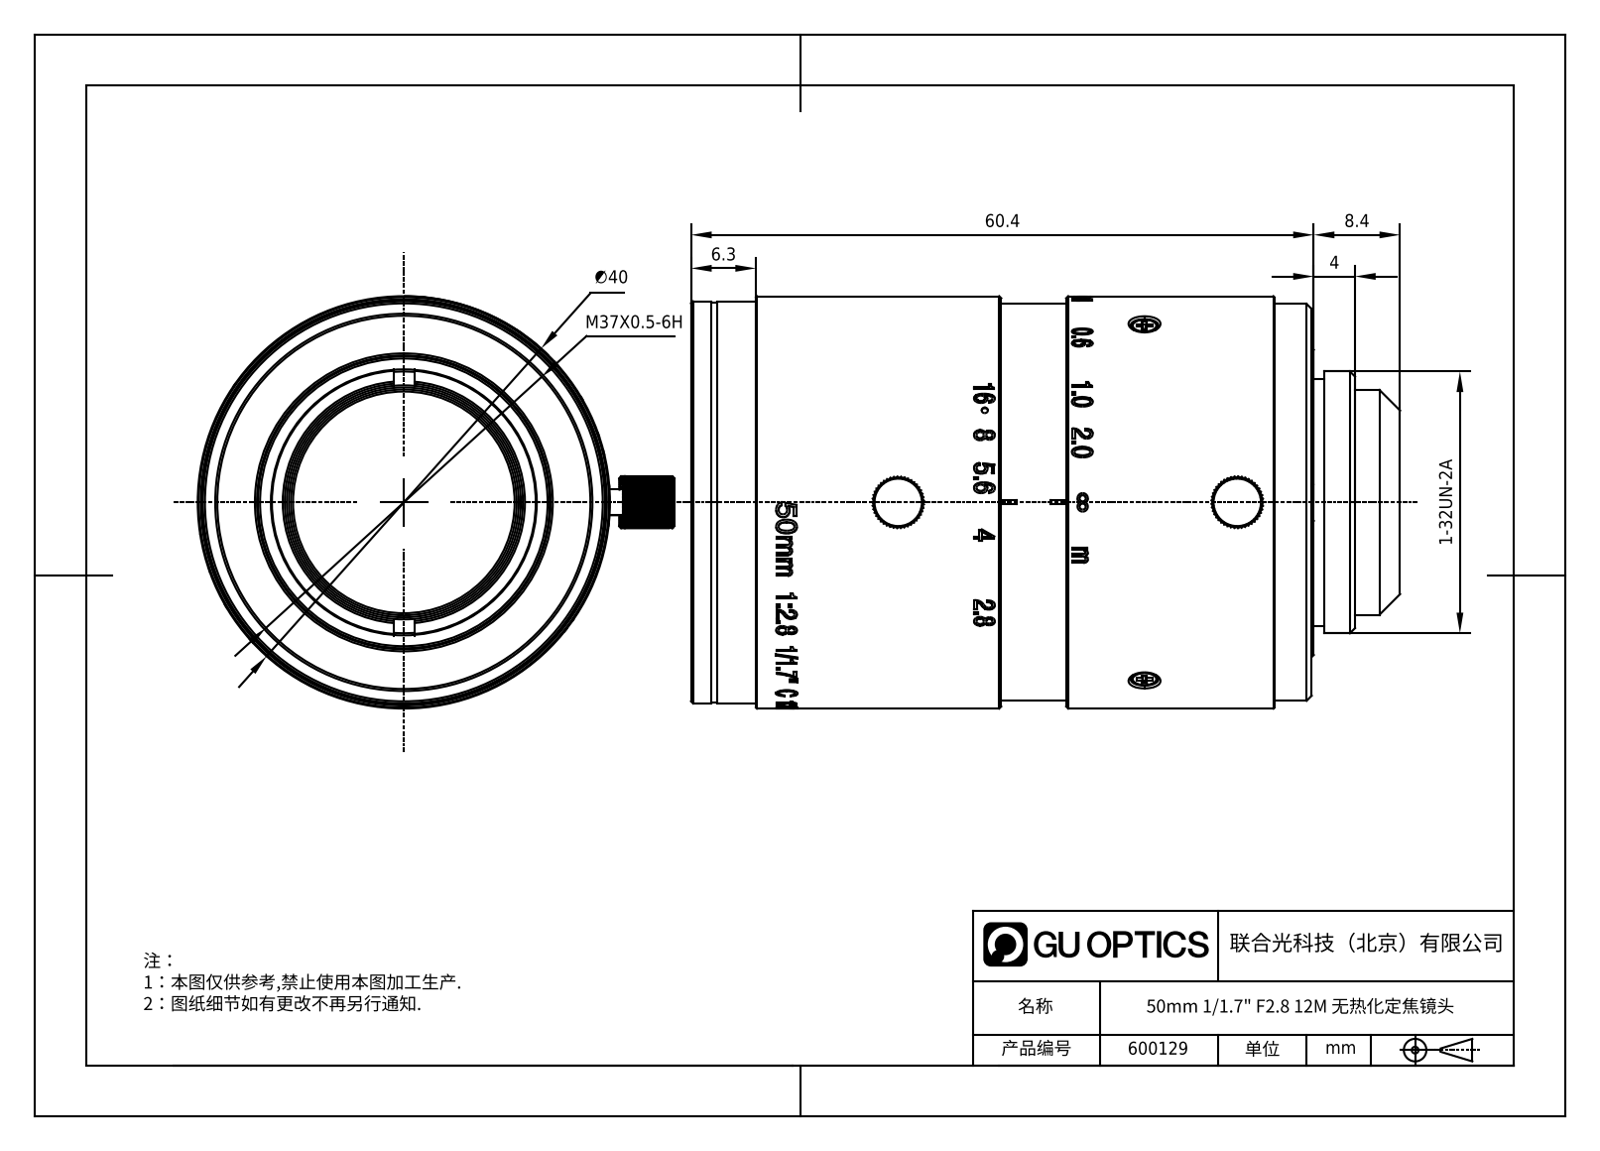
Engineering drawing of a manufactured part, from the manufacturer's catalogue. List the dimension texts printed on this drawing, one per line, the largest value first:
60.4
∅40
M37X0.5-6H
8.4
6.3
4
1-32UN-2A
